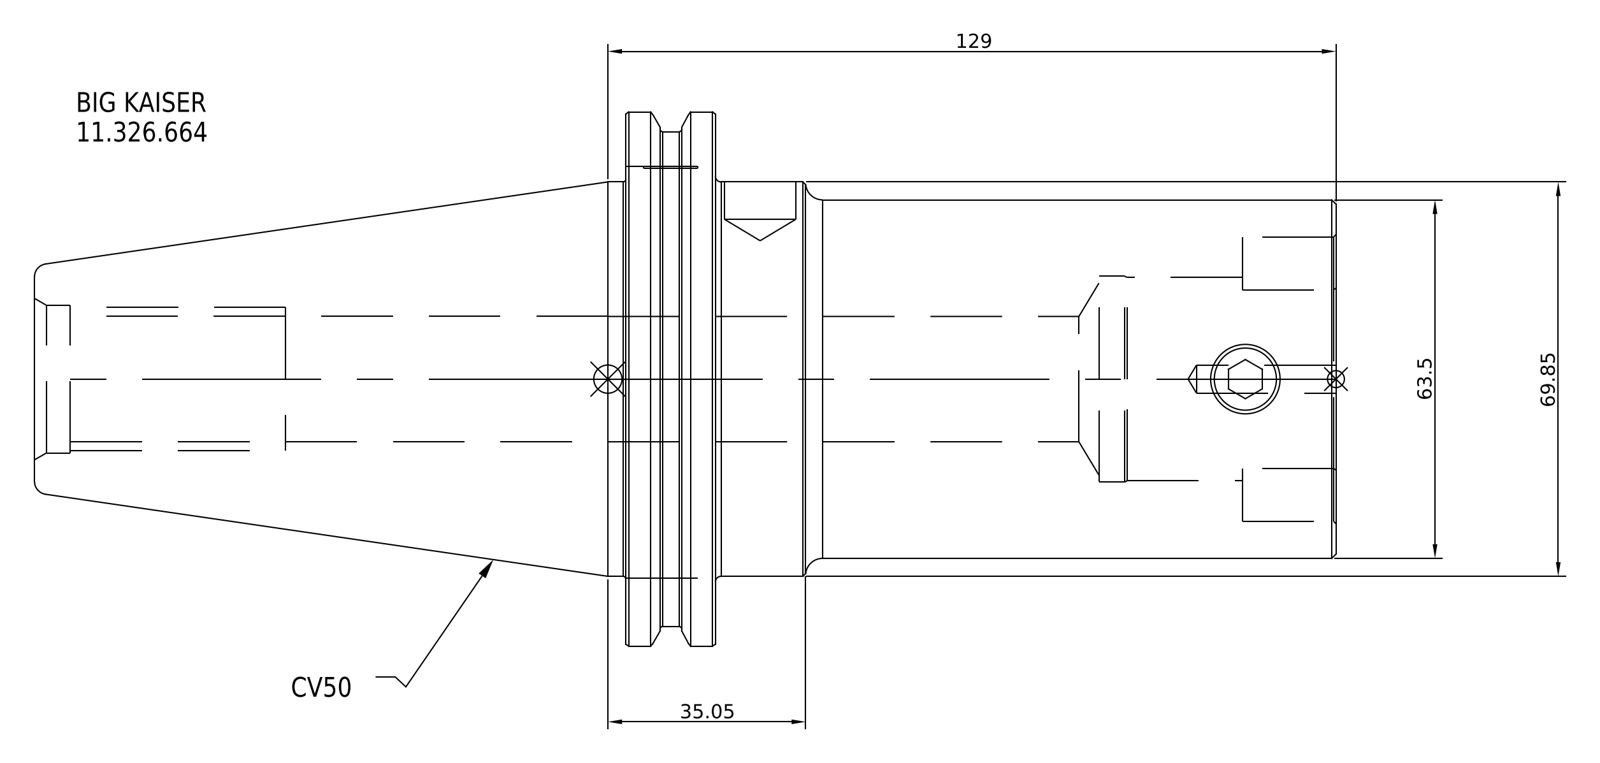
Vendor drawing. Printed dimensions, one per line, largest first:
129
69.85
63.5
35.05
